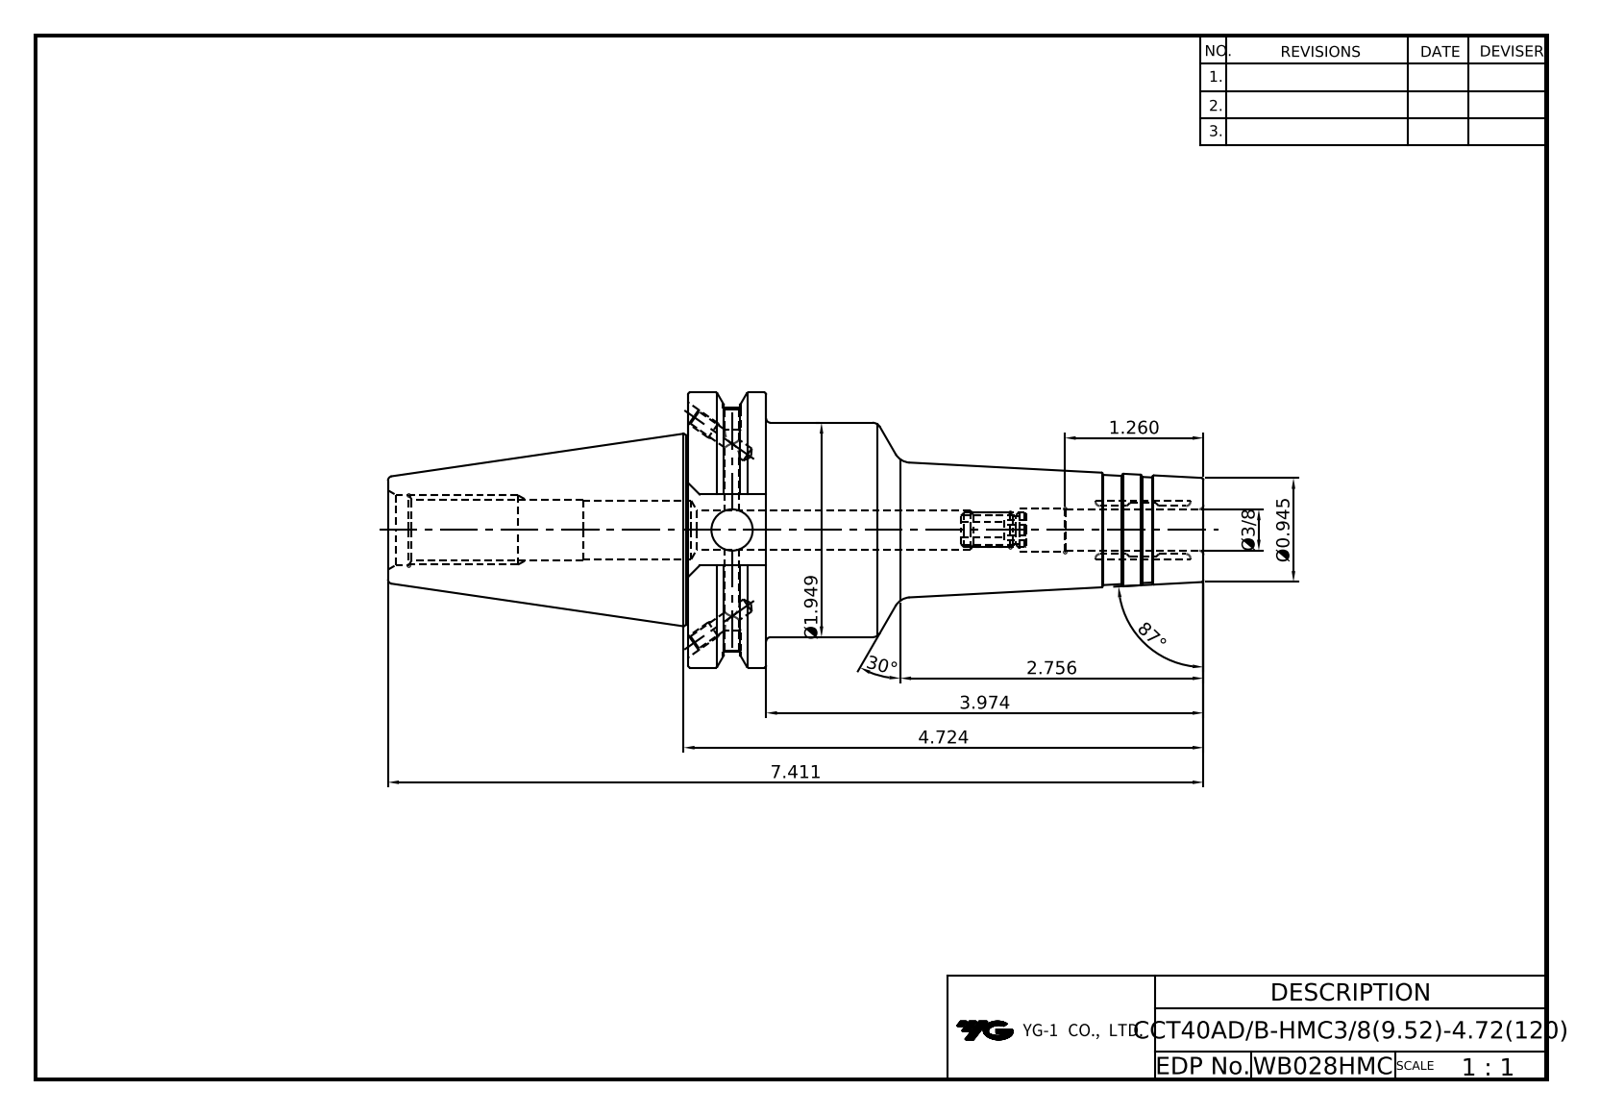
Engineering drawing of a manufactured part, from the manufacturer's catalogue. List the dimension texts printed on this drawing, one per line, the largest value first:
87°
30°
7.411
4.724
3.974
2.756
Ø1.949
1.260
Ø0.945
Ø3/8
